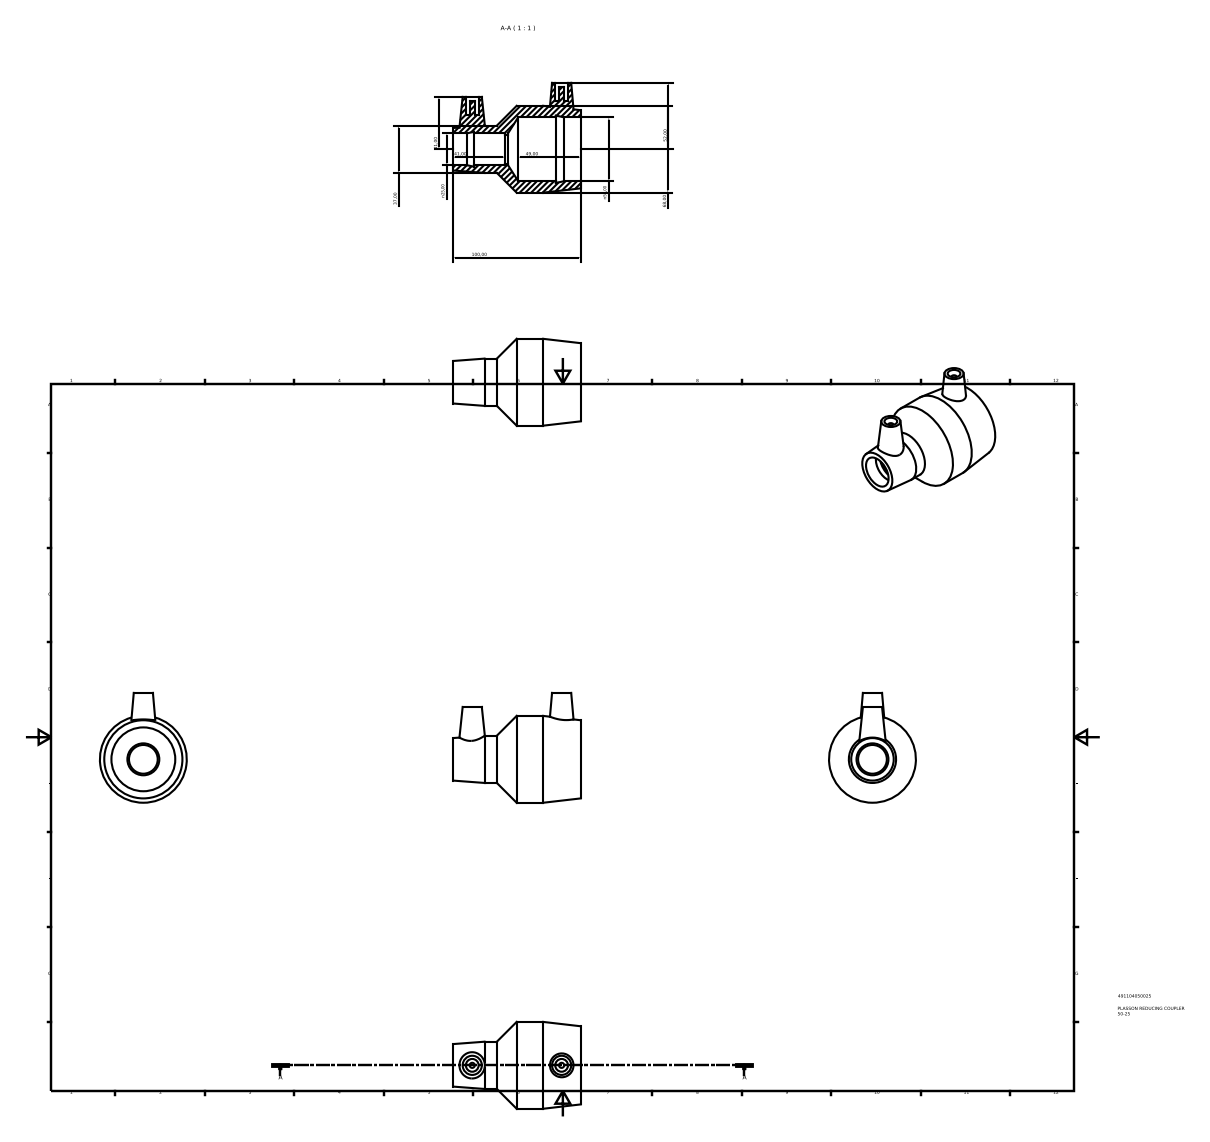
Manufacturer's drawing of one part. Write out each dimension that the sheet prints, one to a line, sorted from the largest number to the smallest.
100,00
68,00
52,00
n50,00
49,00
41,00
41,00
37,00
n25,00
